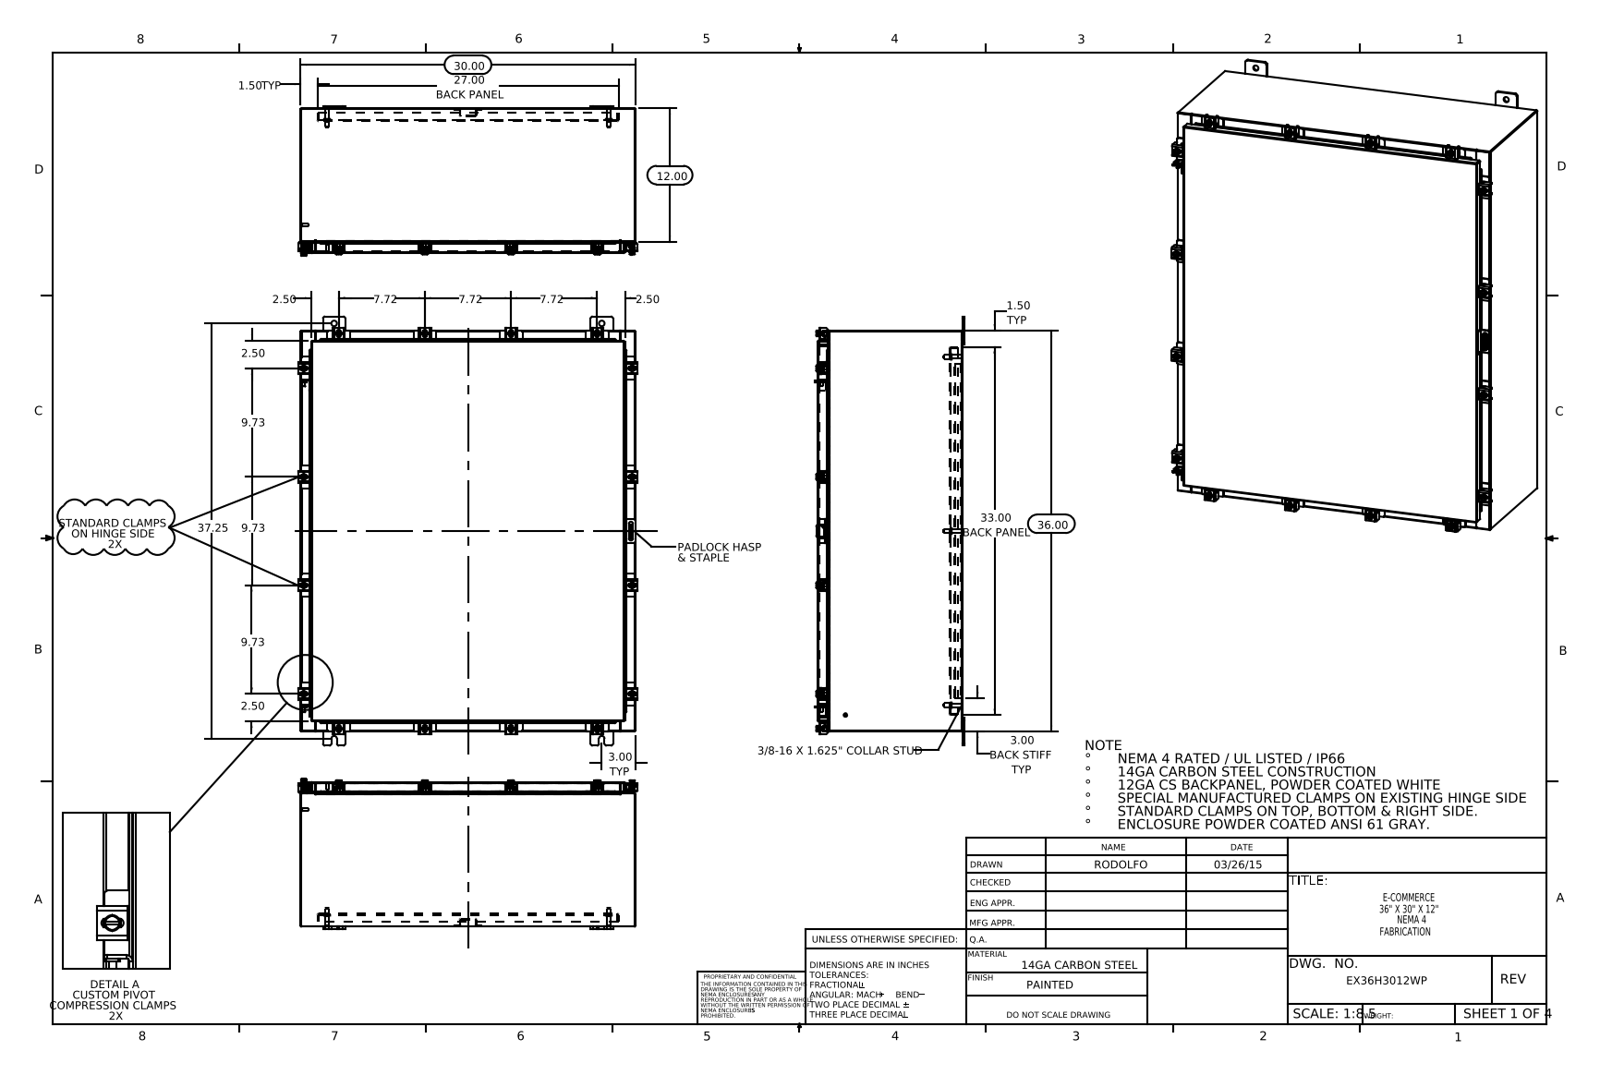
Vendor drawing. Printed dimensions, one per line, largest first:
37.25
36.00
33.00 BACK PANEL
30.00
27.00 BACK PANEL
12.00
9.73
9.73
9.73
7.72
7.72
7.72
3.00 TYP
3.00 BACK STIFF TYP
2.50
2.50
2.50
2.50
1.50 TYP
1.50 TYP
